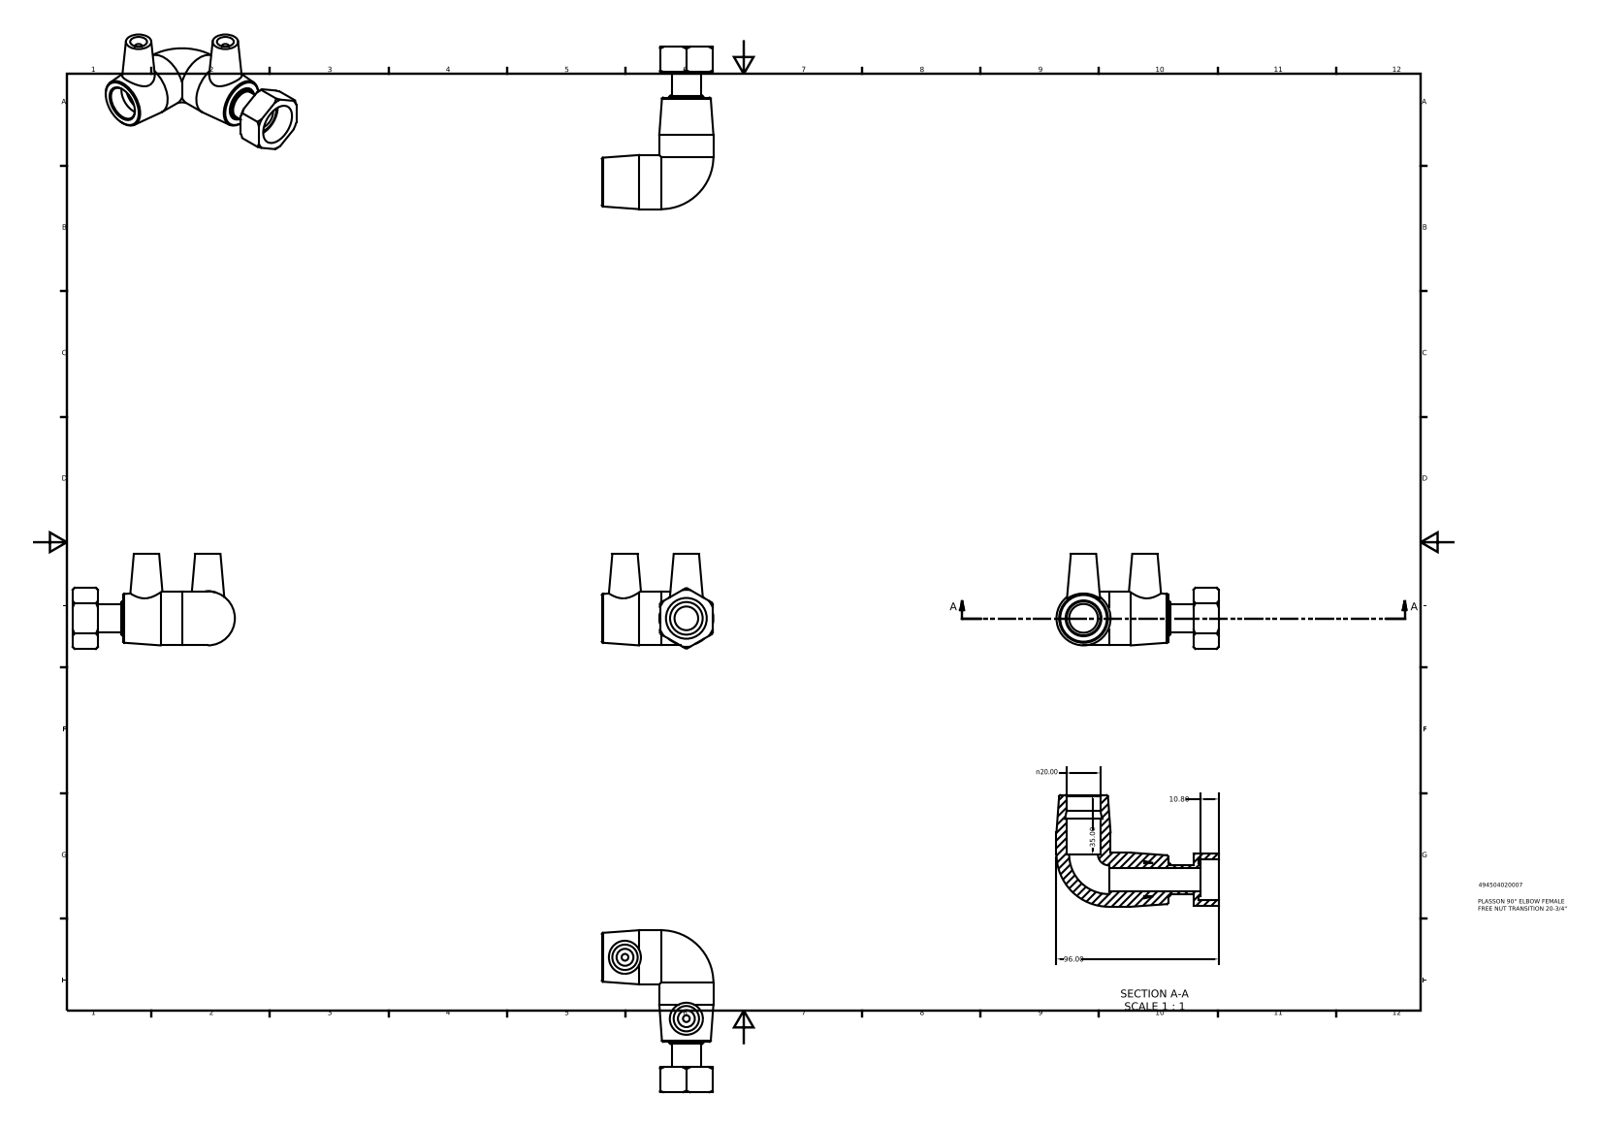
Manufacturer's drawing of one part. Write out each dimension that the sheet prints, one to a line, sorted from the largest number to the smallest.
96.00
35.00
n20.00
10.80
